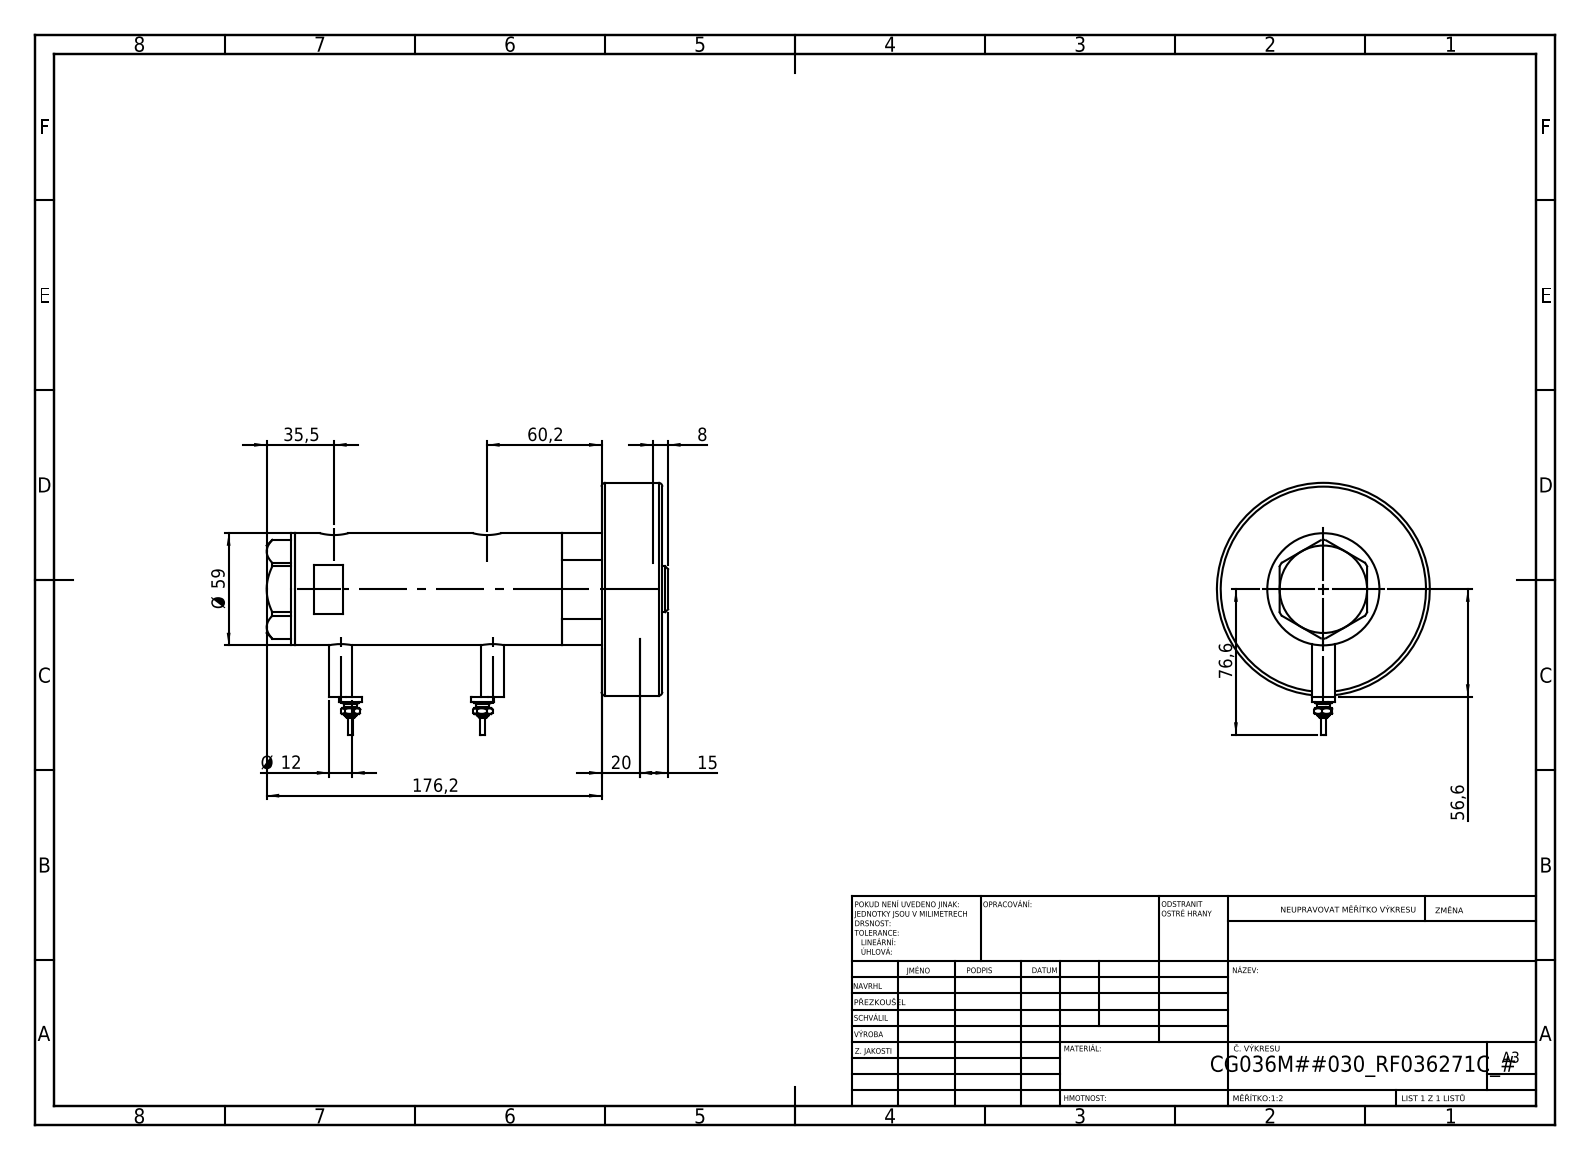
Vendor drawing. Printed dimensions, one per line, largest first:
176,2
76,6
60,2
Ø 59
56,6
35,5
20
15
Ø 12
8
